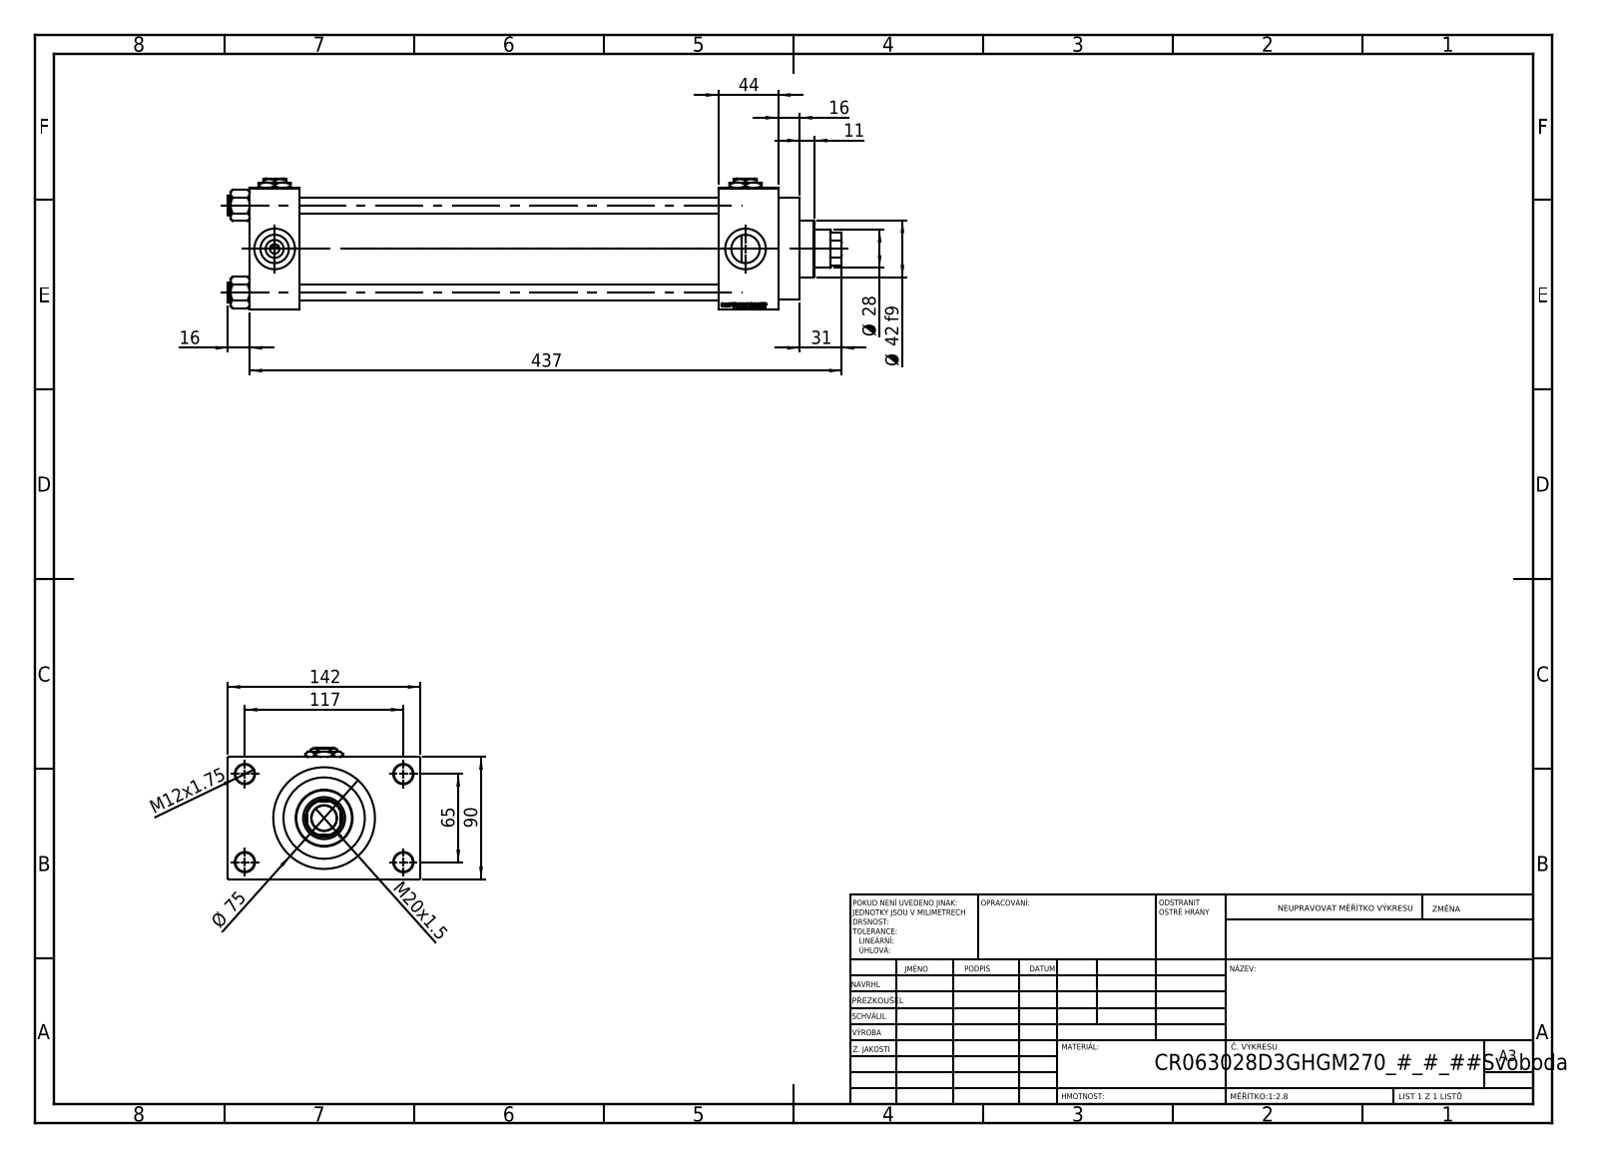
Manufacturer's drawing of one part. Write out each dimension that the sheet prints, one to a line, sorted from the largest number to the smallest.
437
142
117
90
Ø 75
65
44
Ø 42 f9
31
Ø 28
M20x1.5
16
16
M12x1.75
11
